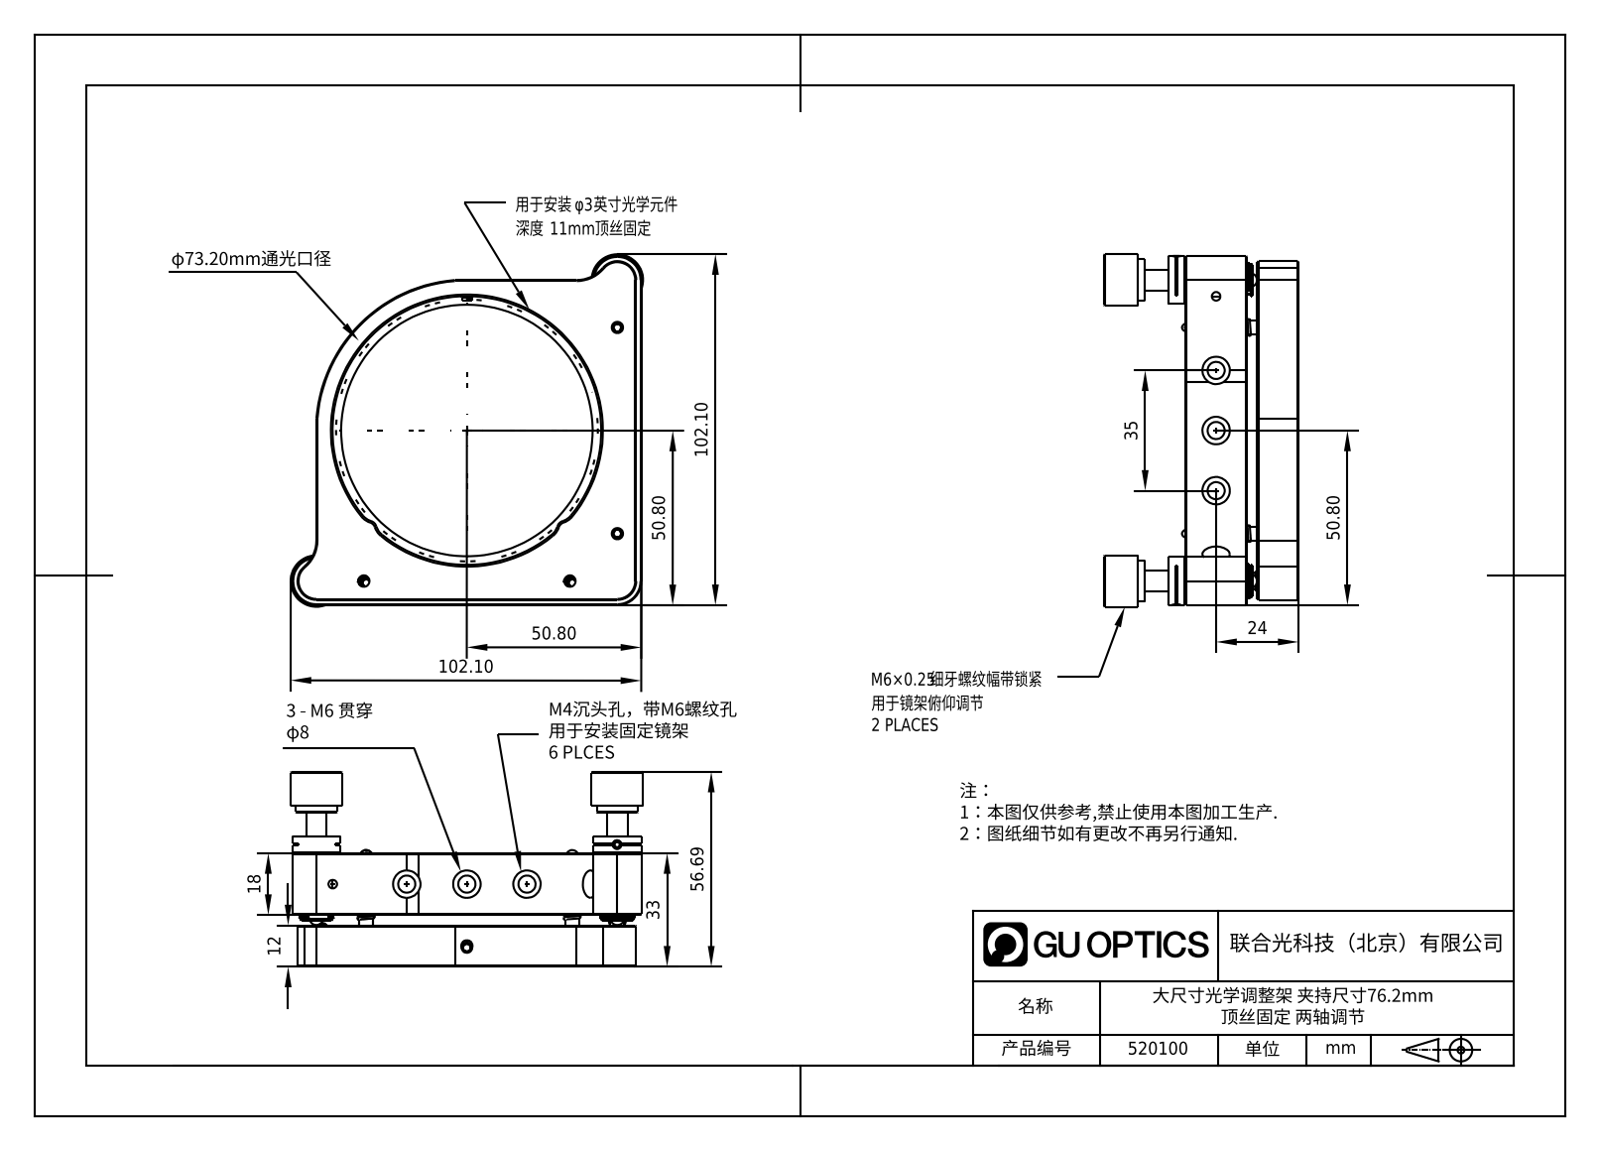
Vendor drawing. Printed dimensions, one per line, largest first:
102.10
102.10
56.69
50.80
50.80
50.80
35
33
24
18
12
